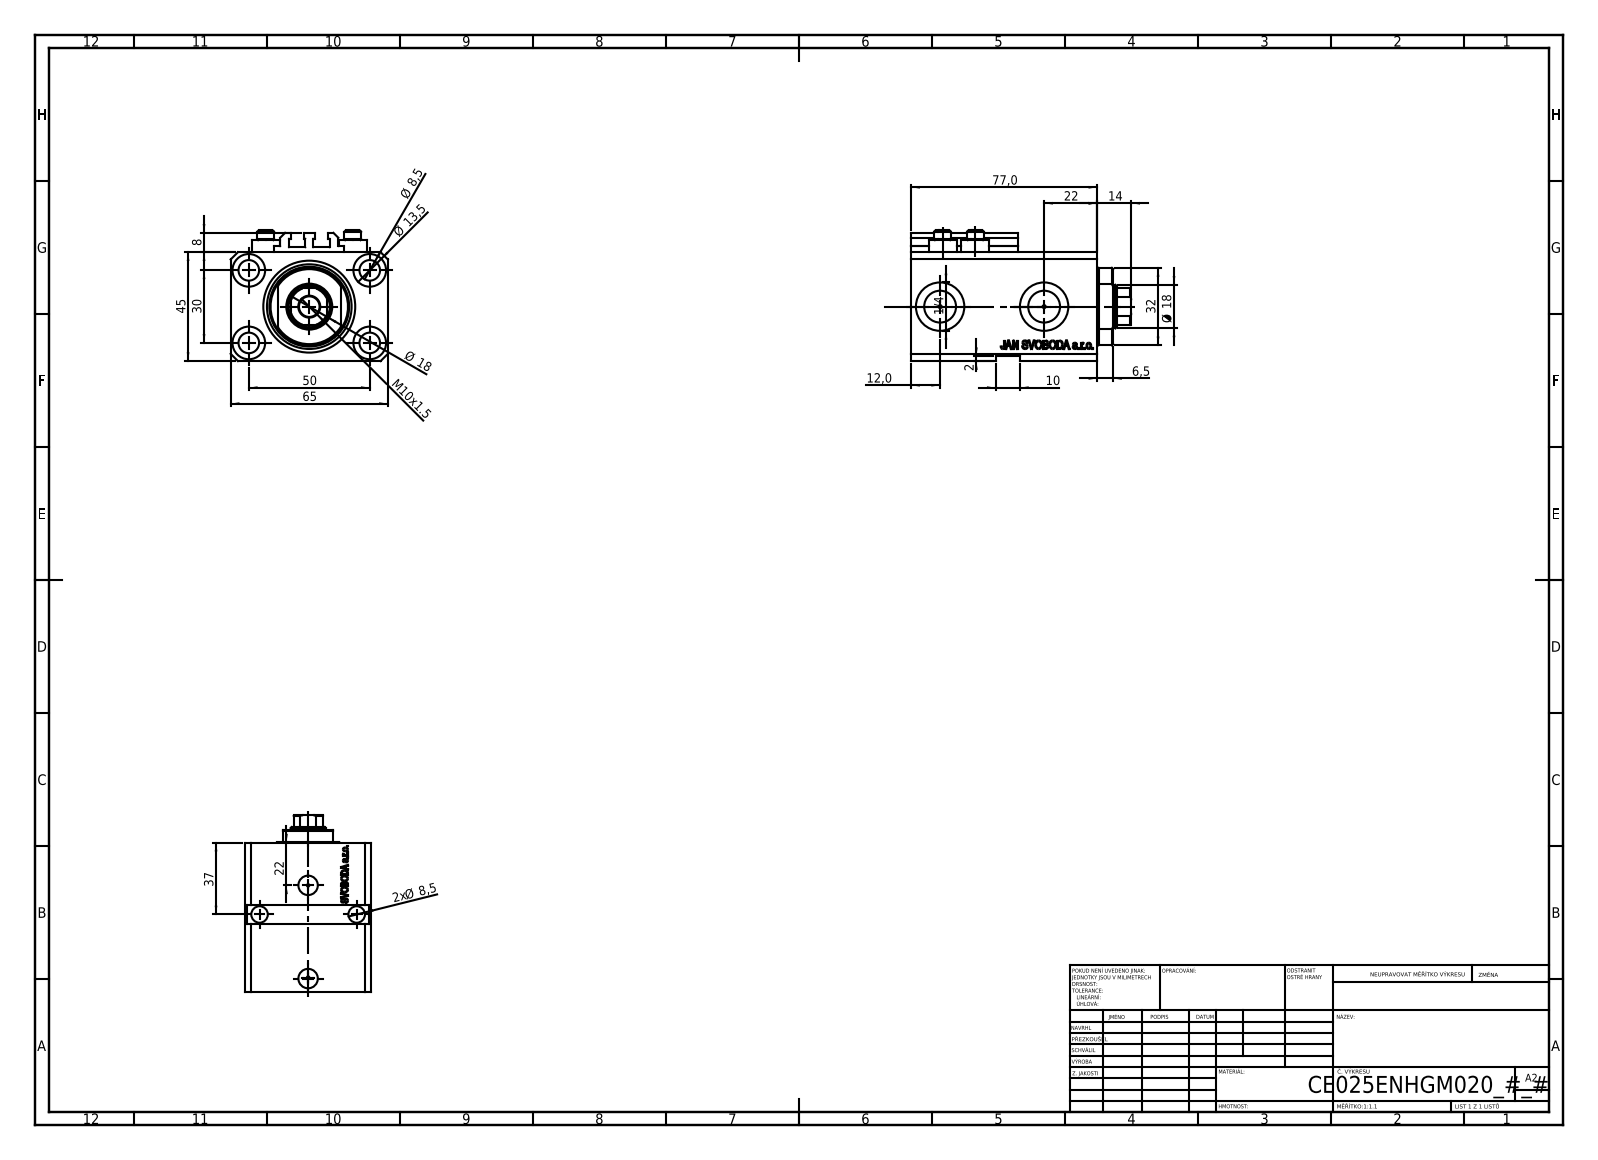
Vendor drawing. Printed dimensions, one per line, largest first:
77,0
65
50
45
37
32
30
22
22
Ø 18
Ø 18
14
Ø 13,5
12,0
M10x1.5
10
Ø 8,5
2x Ø 8,5
8
6,5
2
1/4
